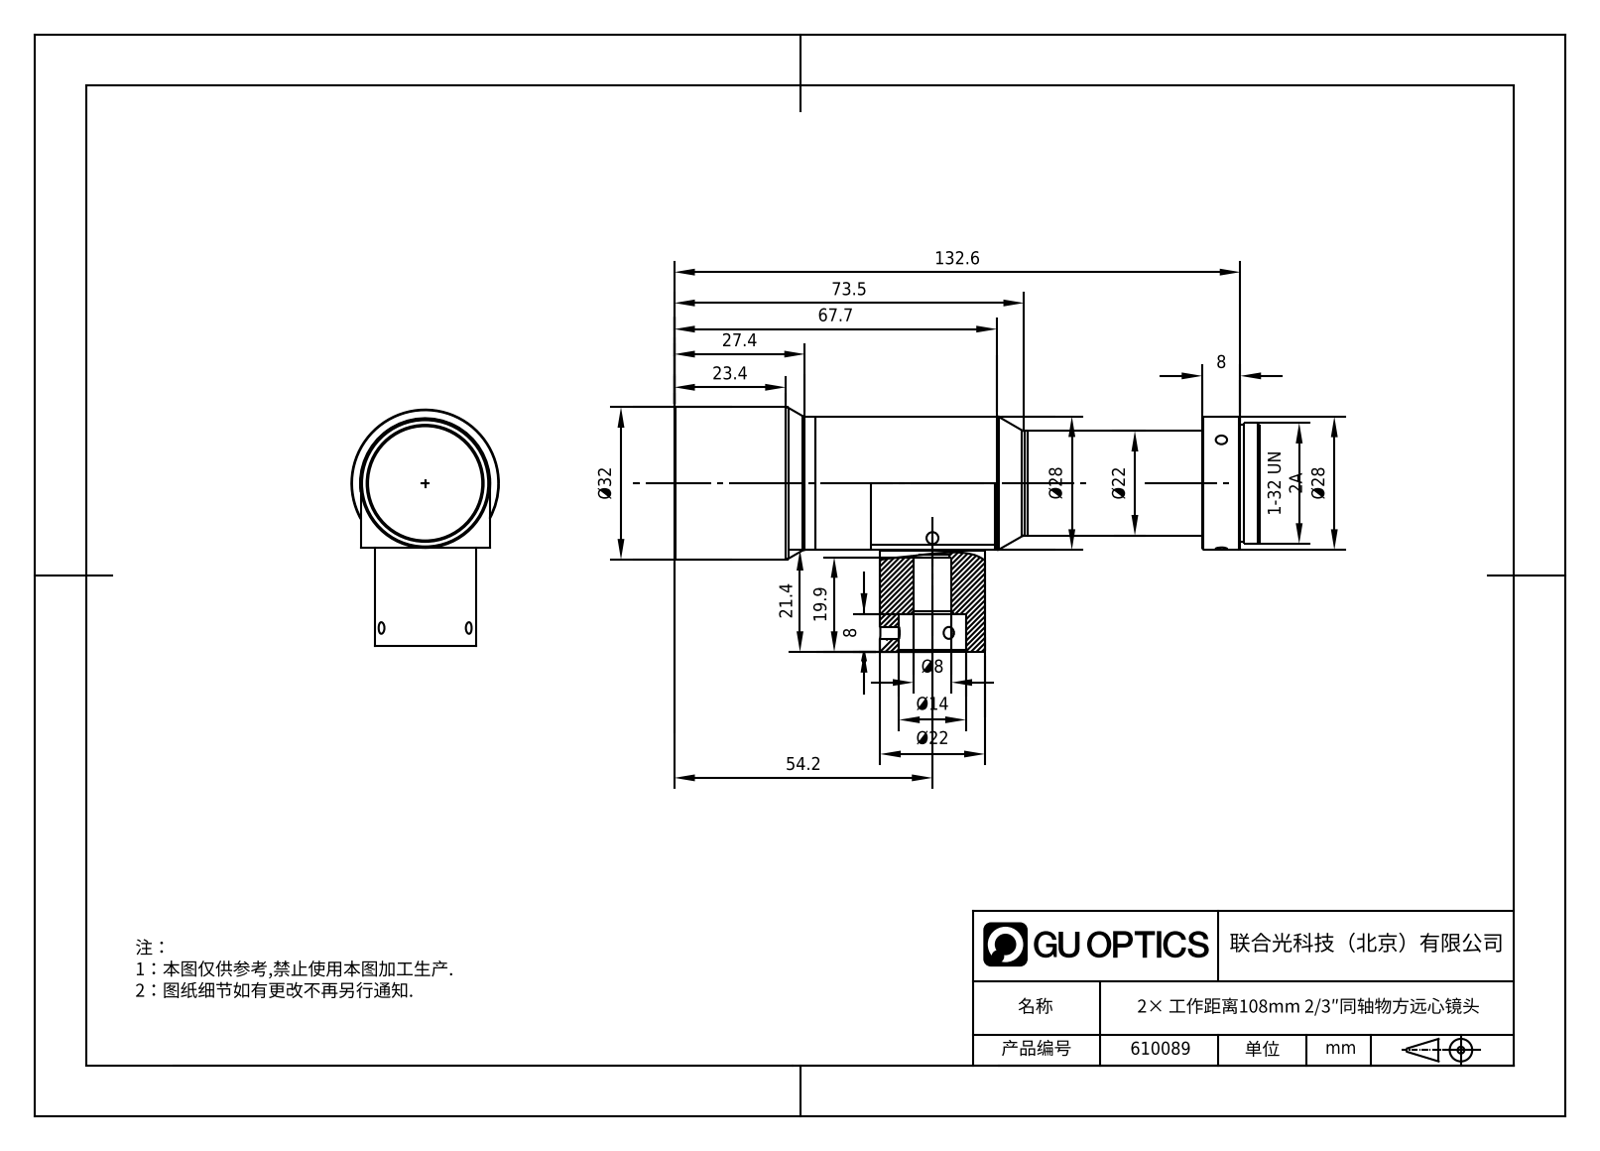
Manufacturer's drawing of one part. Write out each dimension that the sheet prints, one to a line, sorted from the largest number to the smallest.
132.6
73.5
67.7
54.2
Ø32
Ø28
Ø28
27.4
23.4
Ø22
Ø22
21.4
19.9
Ø14
Ø8
8
8
1-32 UN 2A
